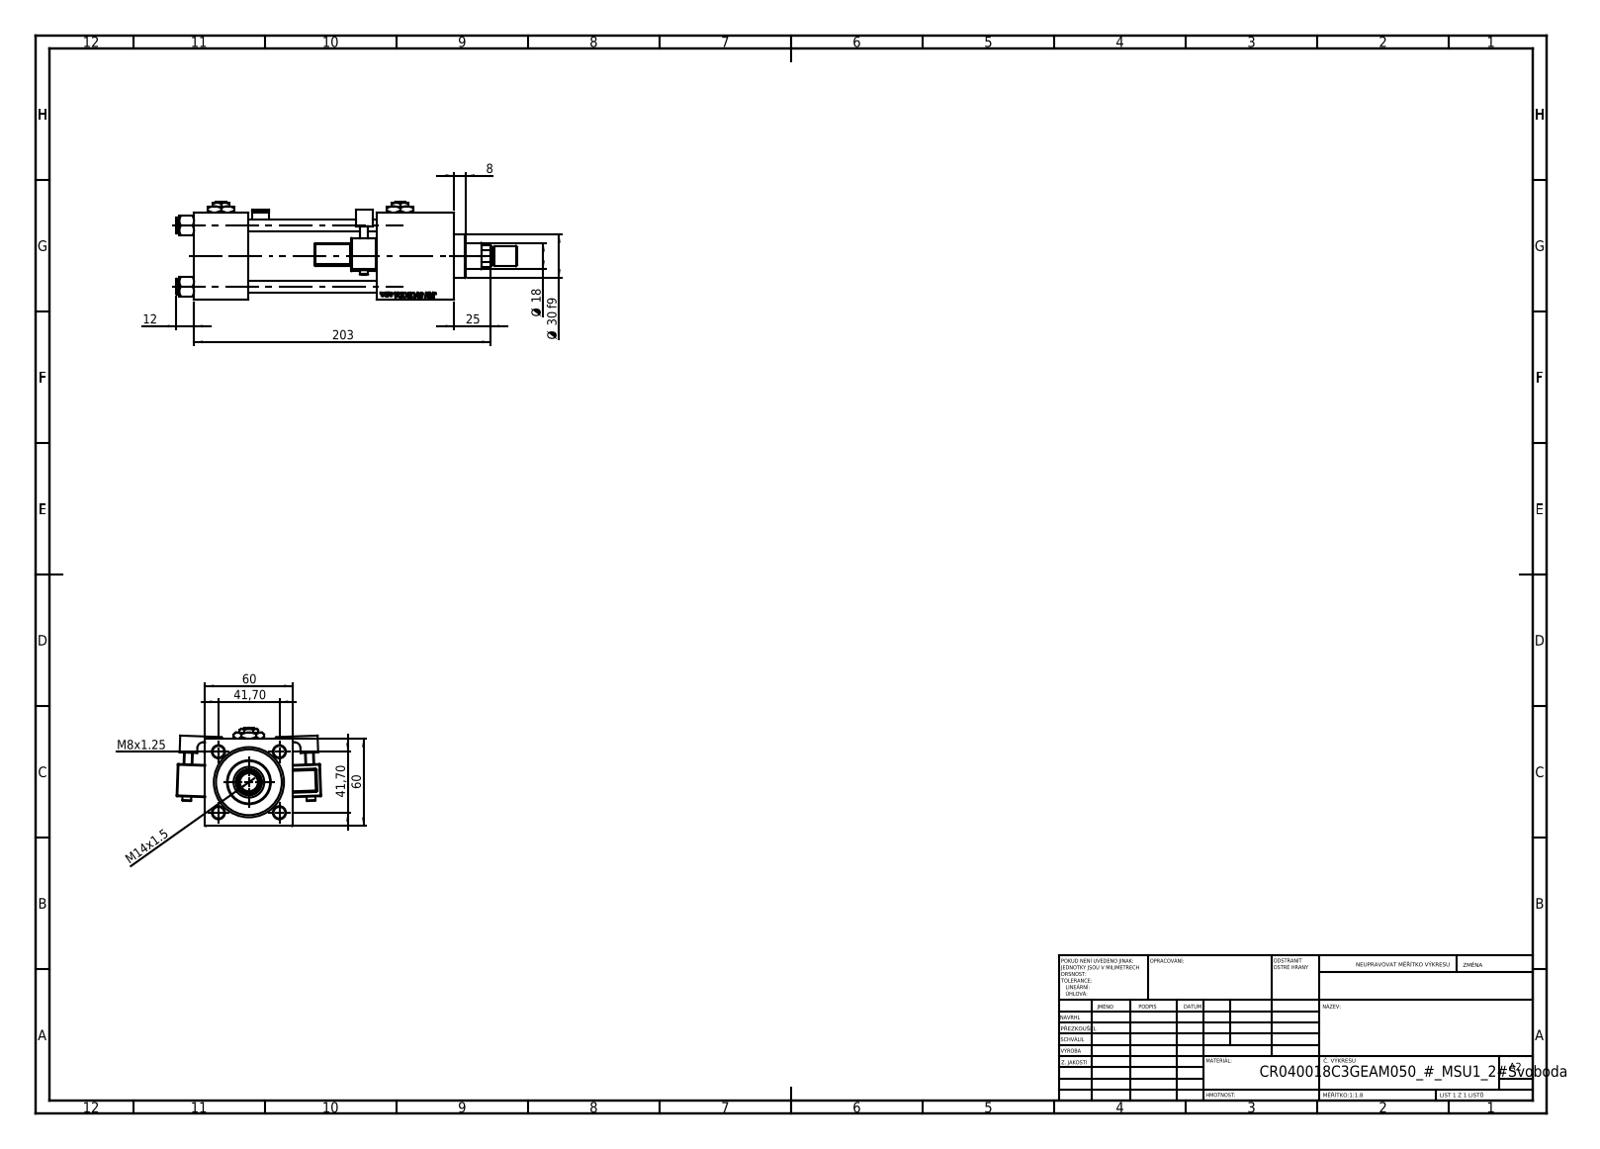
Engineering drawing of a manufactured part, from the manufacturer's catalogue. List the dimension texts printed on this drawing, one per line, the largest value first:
203
60
60
41,70
41,70
Ø 30 f9
25
Ø 18
M14x1.5
12
8
M8x1.25
